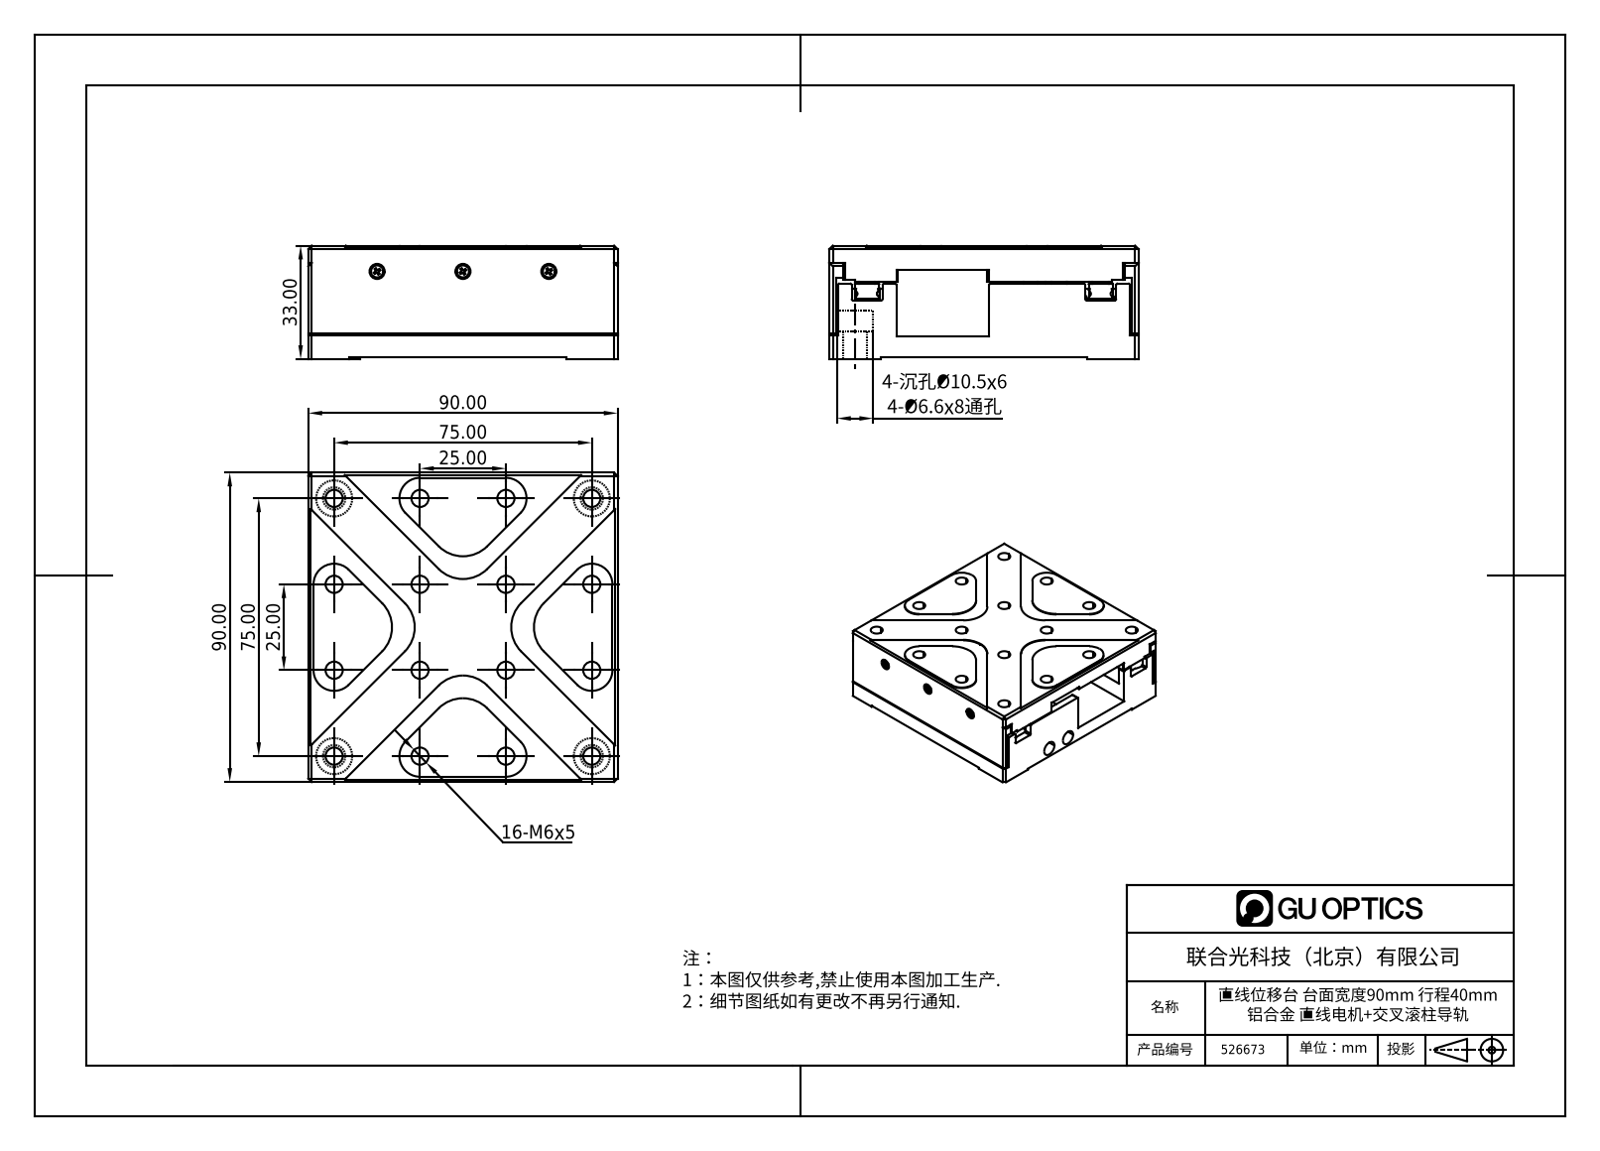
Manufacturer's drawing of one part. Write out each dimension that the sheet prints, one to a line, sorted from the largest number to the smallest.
90.00
90.00
75.00
75.00
33.00
25.00
25.00
16-M6x5
4-沉孔Ø10.5x6 4-Ø6.6x8通孔
